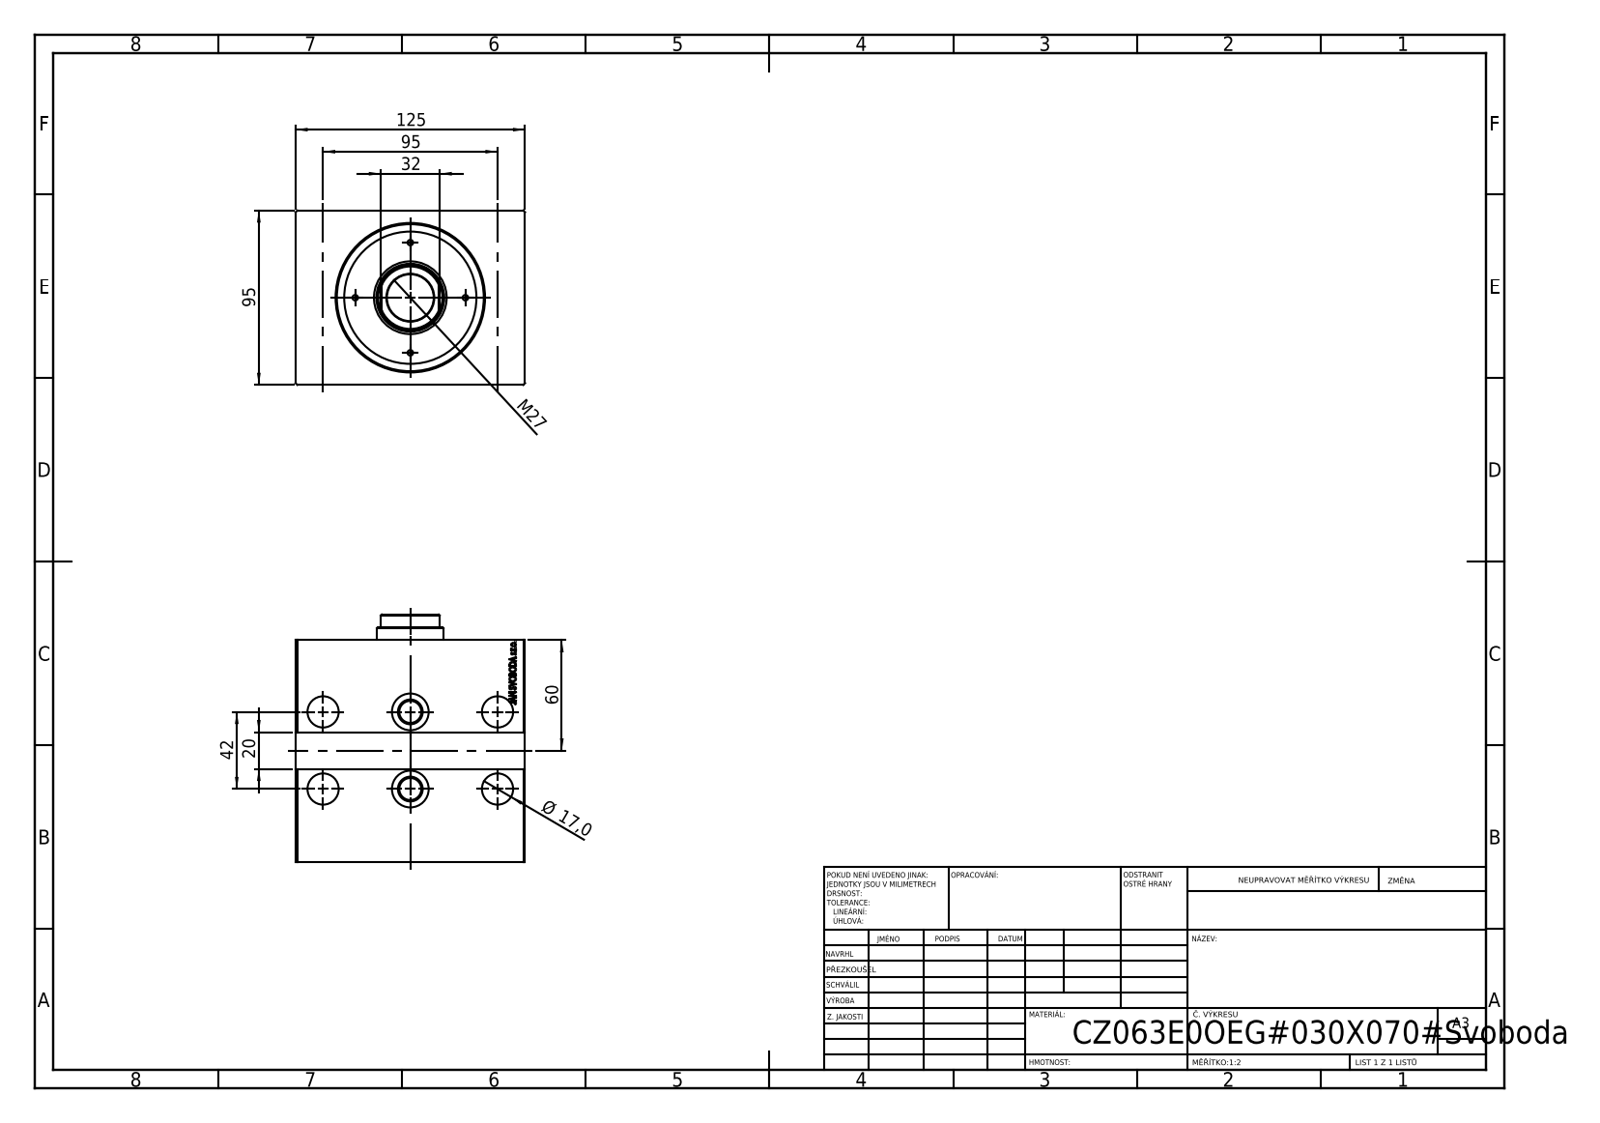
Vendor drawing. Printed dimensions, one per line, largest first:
125
95
95
60
42
32
M27
20
Ø 17,0
